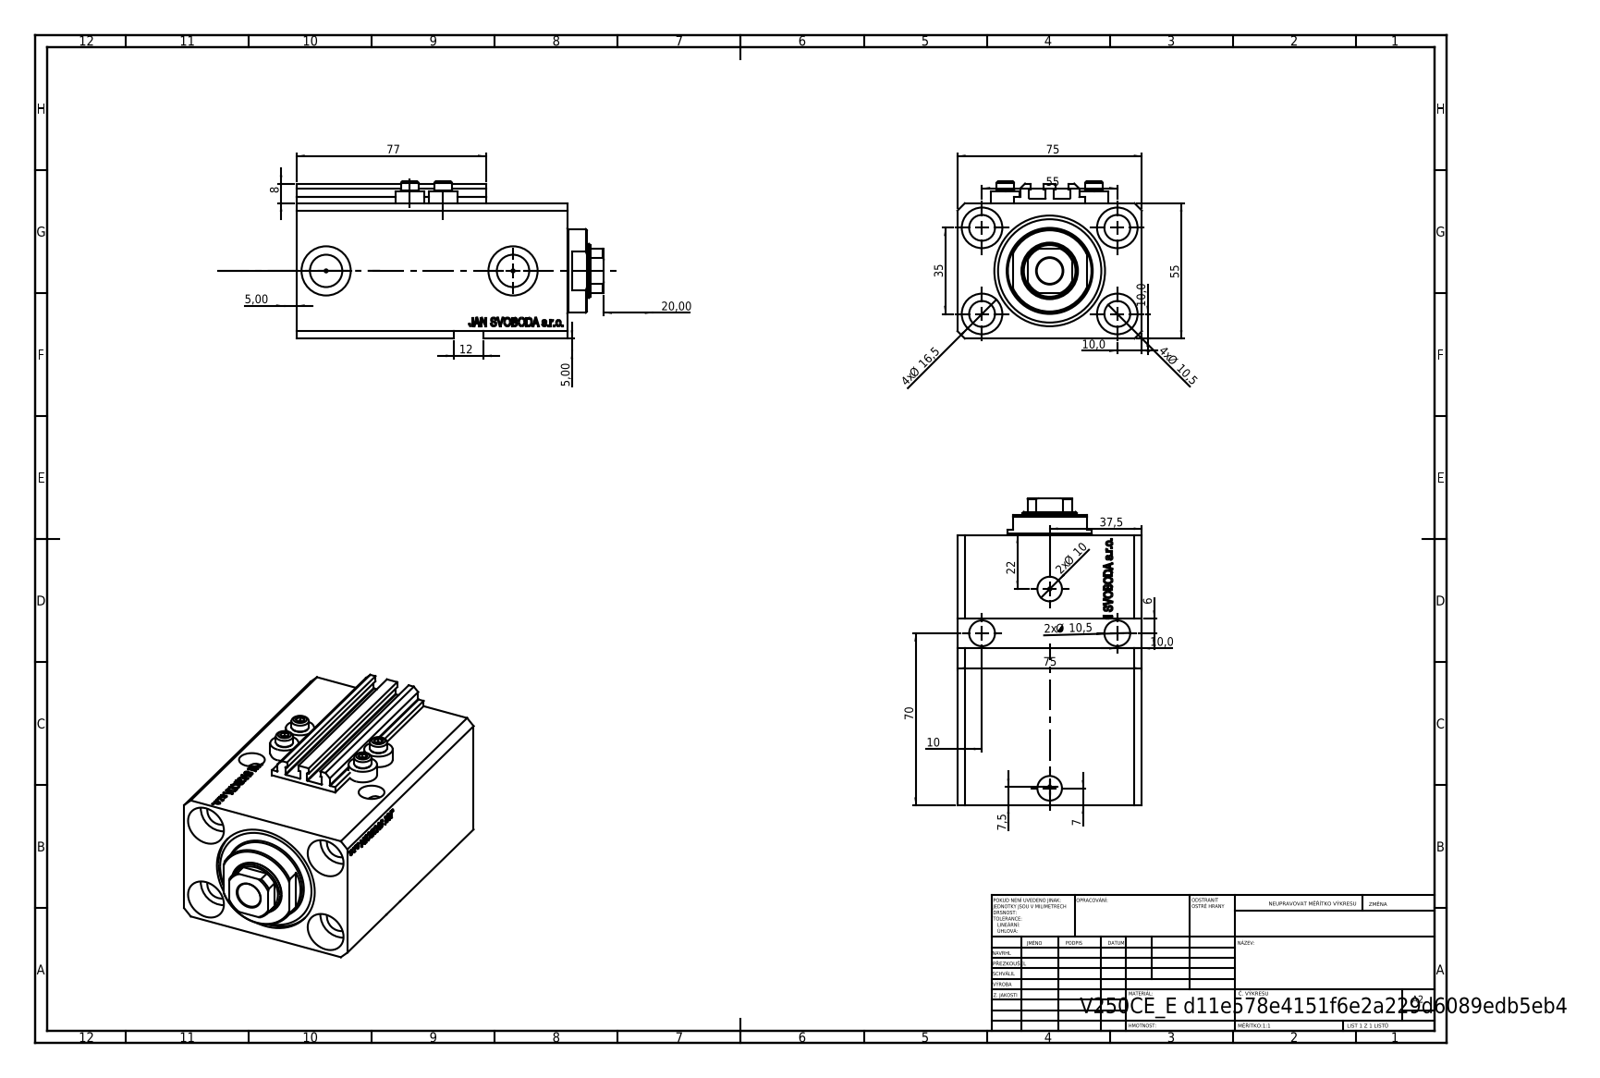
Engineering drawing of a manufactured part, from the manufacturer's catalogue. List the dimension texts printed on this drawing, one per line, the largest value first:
77
75
75
70
55
55
37,5
35
22
20,00
4x Ø 16,5
12
4x Ø 10,5
2x Ø 10,5
10,0
10,0
2x Ø 10
10,0
10
8
7,5
7
6
5,00
5,00
